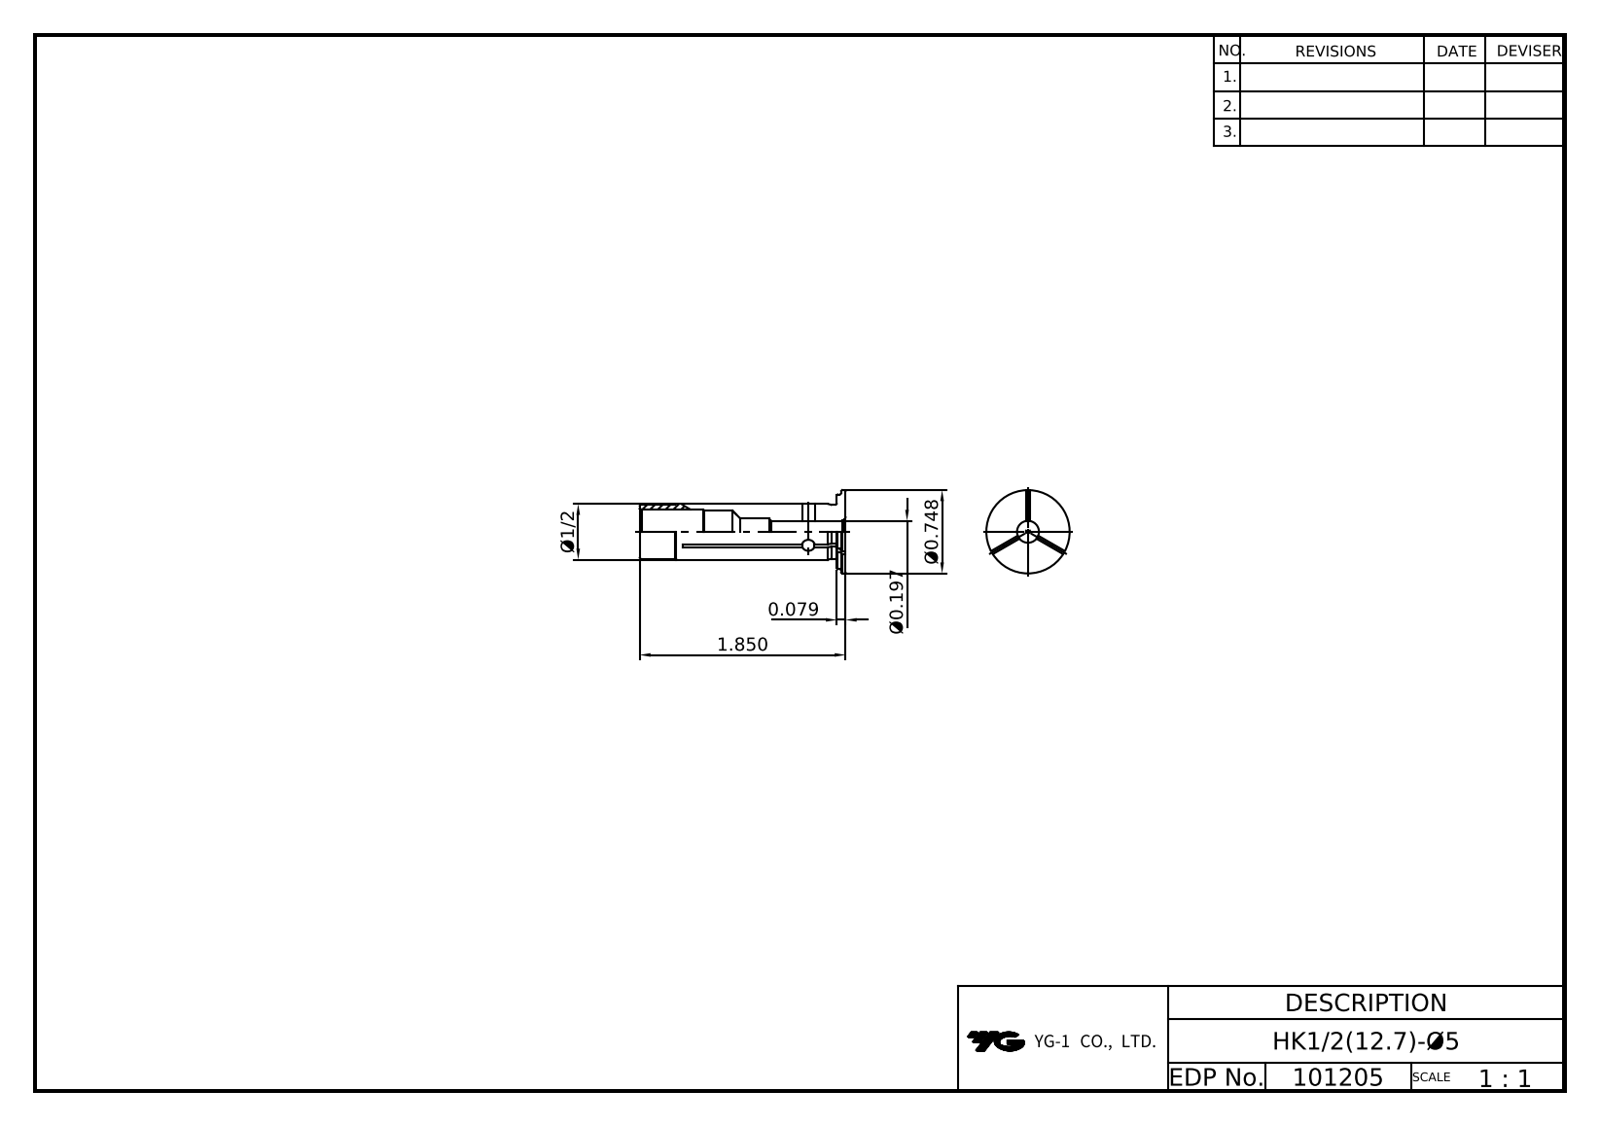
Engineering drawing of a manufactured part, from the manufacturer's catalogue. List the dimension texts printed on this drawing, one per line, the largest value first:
1.850
Ø0.748
Ø1/2
0.079
